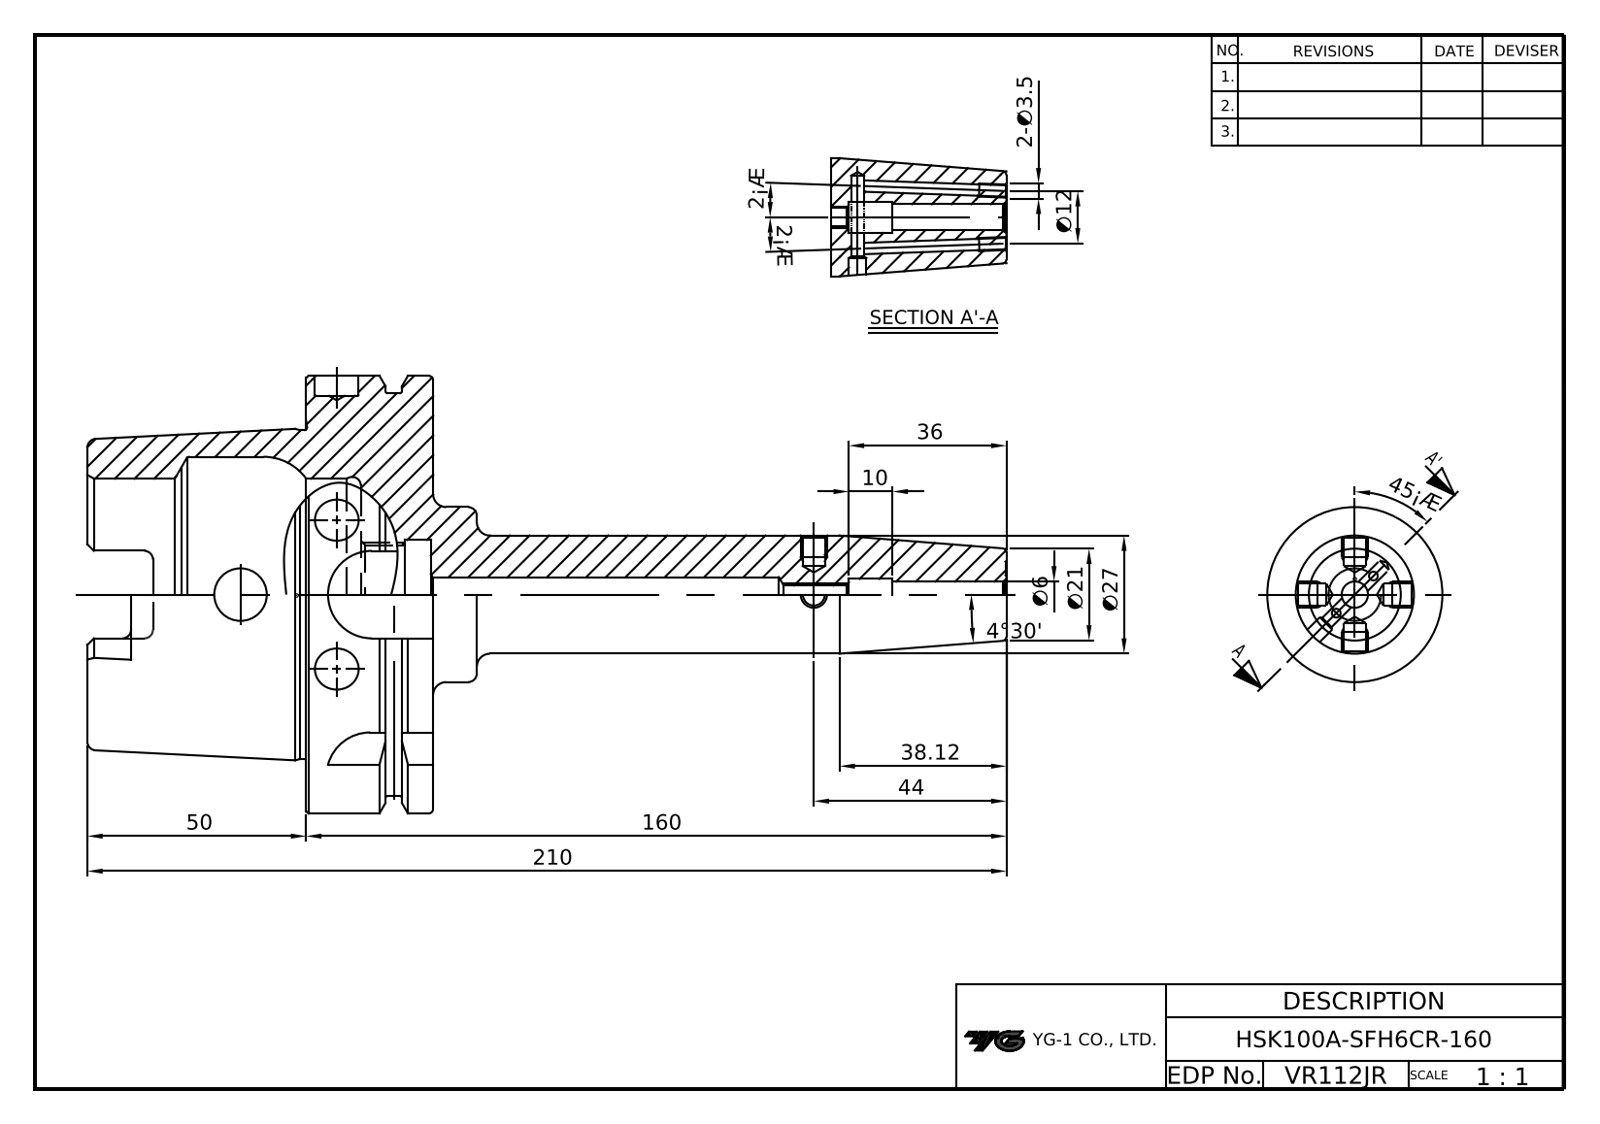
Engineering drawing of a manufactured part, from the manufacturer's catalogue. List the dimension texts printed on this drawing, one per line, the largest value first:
358.00
358.00
225.00
210.00
160.00
50.00
44.00
38.12
36.00
27.00
21.00
12.00
10.00
6.00
4°30'
3.50
